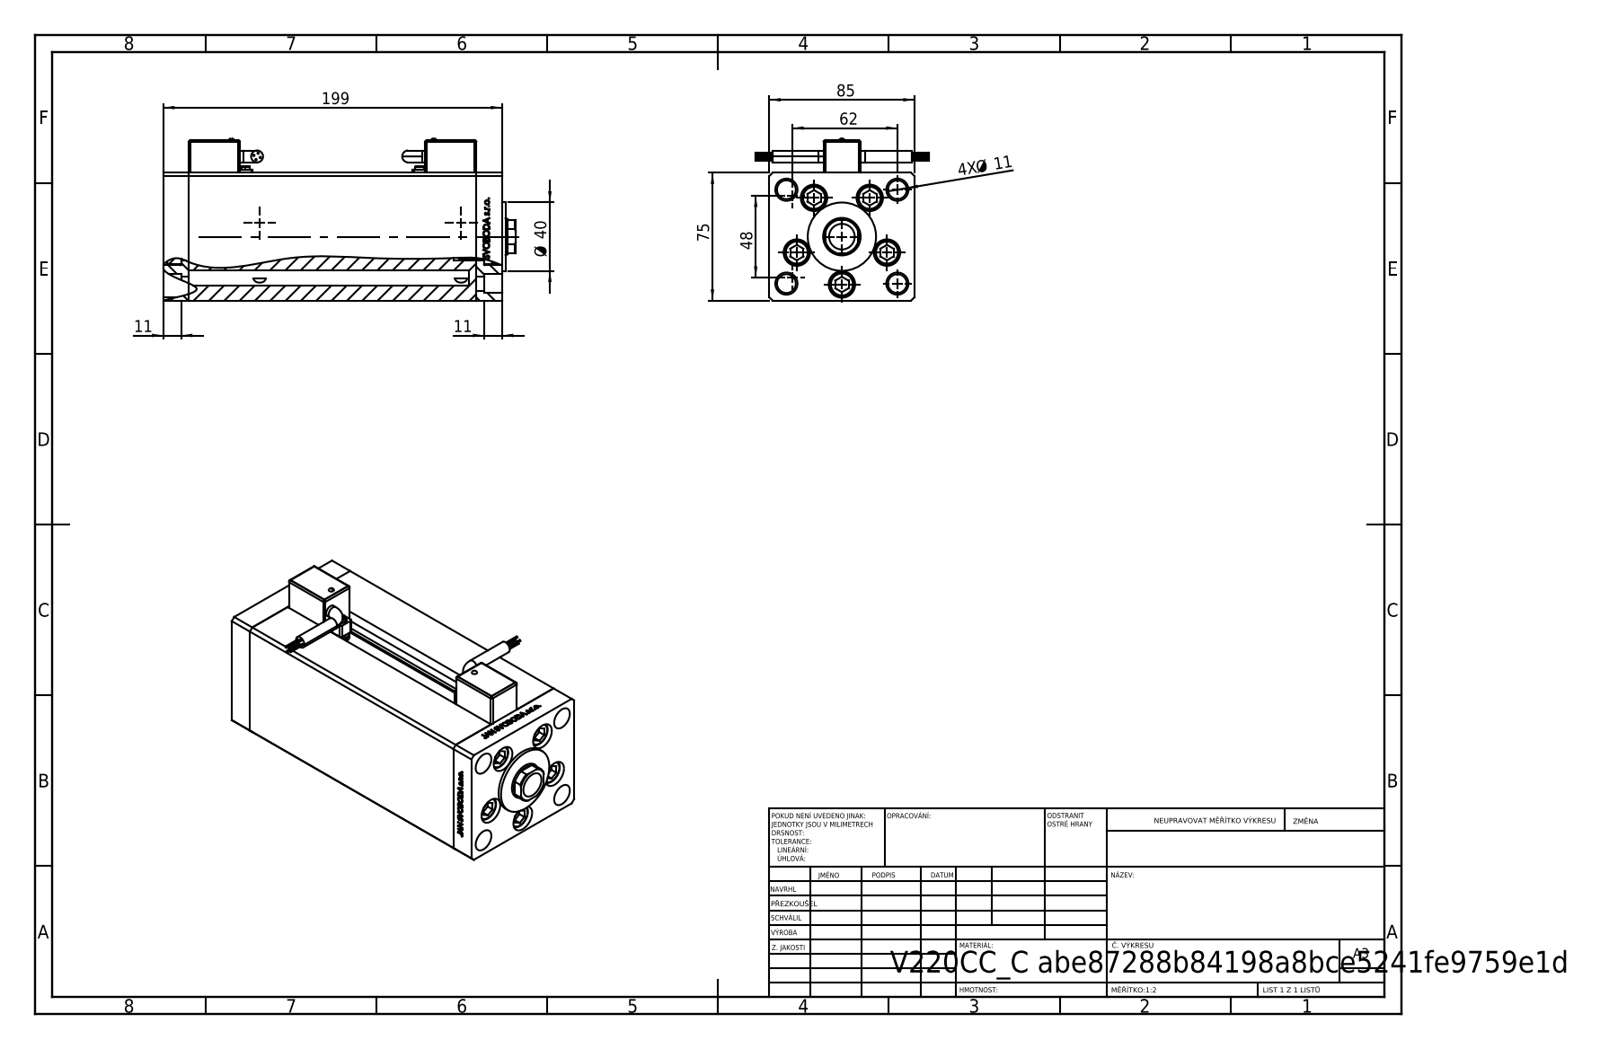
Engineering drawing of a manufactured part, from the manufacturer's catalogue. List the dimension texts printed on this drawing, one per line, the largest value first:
199
85
75
62
48
Ø 40
11
11
4X Ø 11
